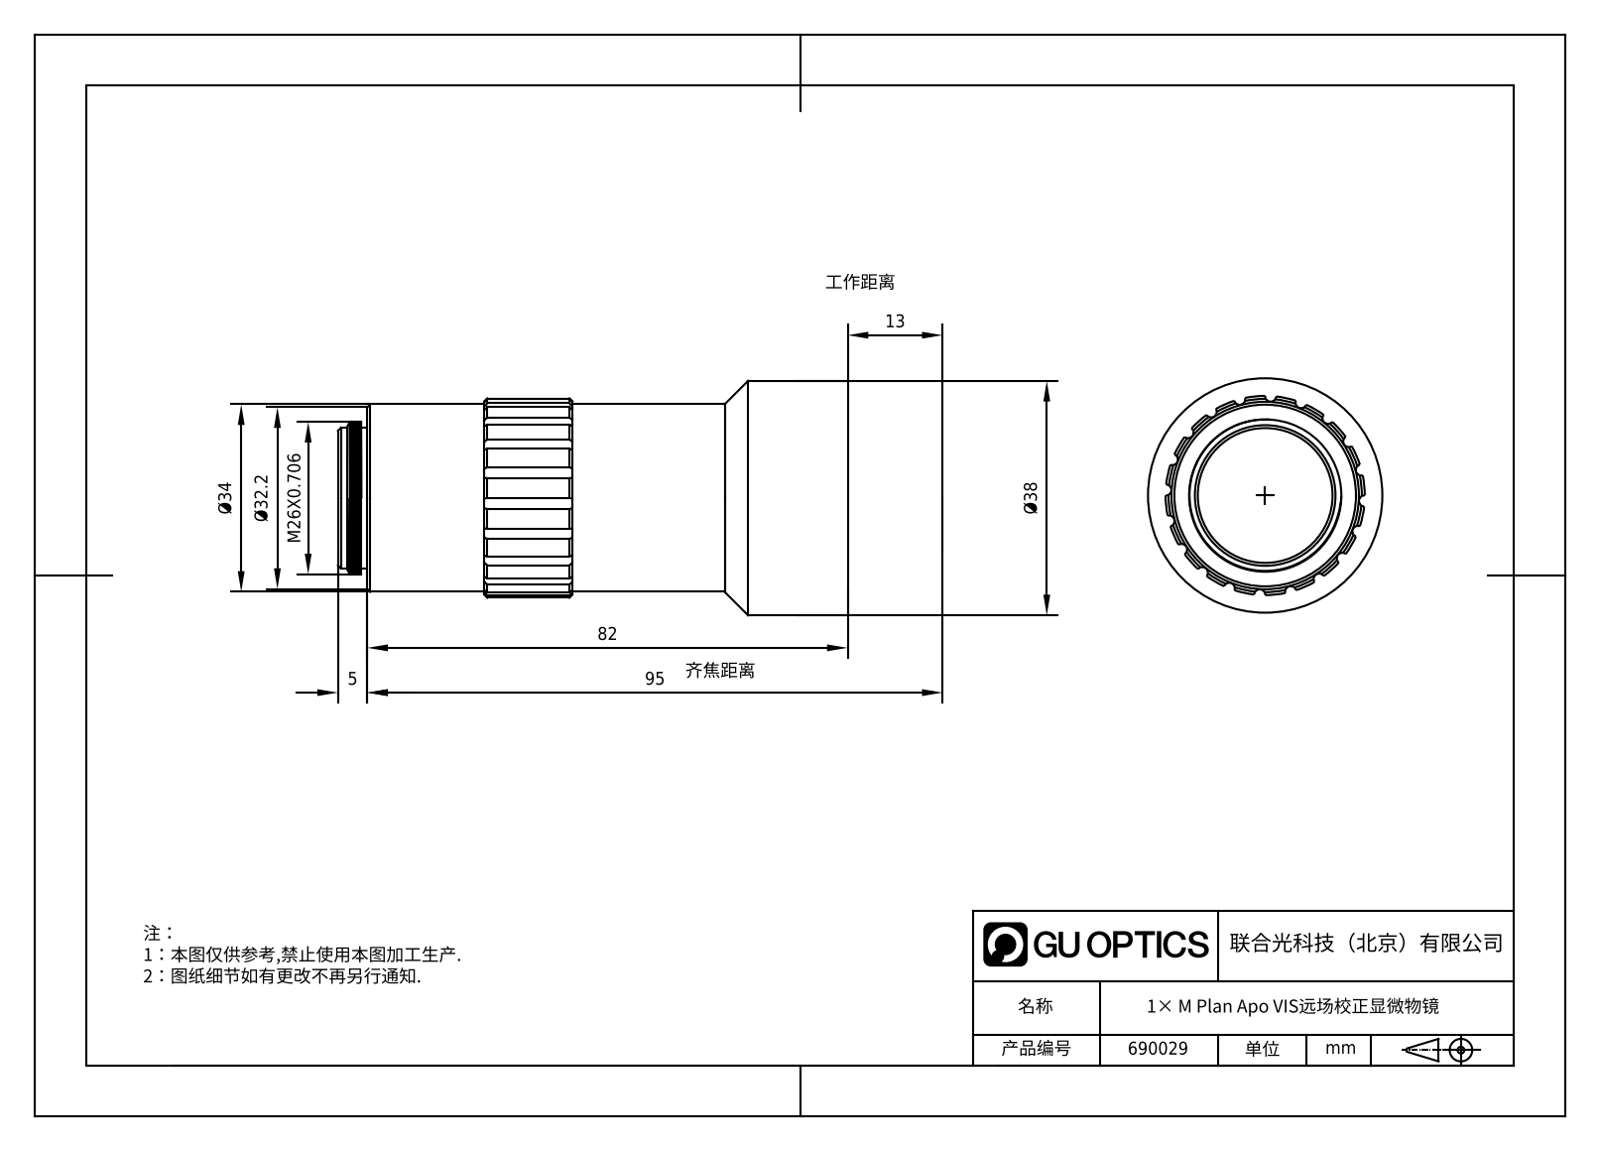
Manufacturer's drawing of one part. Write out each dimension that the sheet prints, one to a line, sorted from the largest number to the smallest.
95
82
Ø38
Ø34
Ø32.2
M26X0.706
13
5
